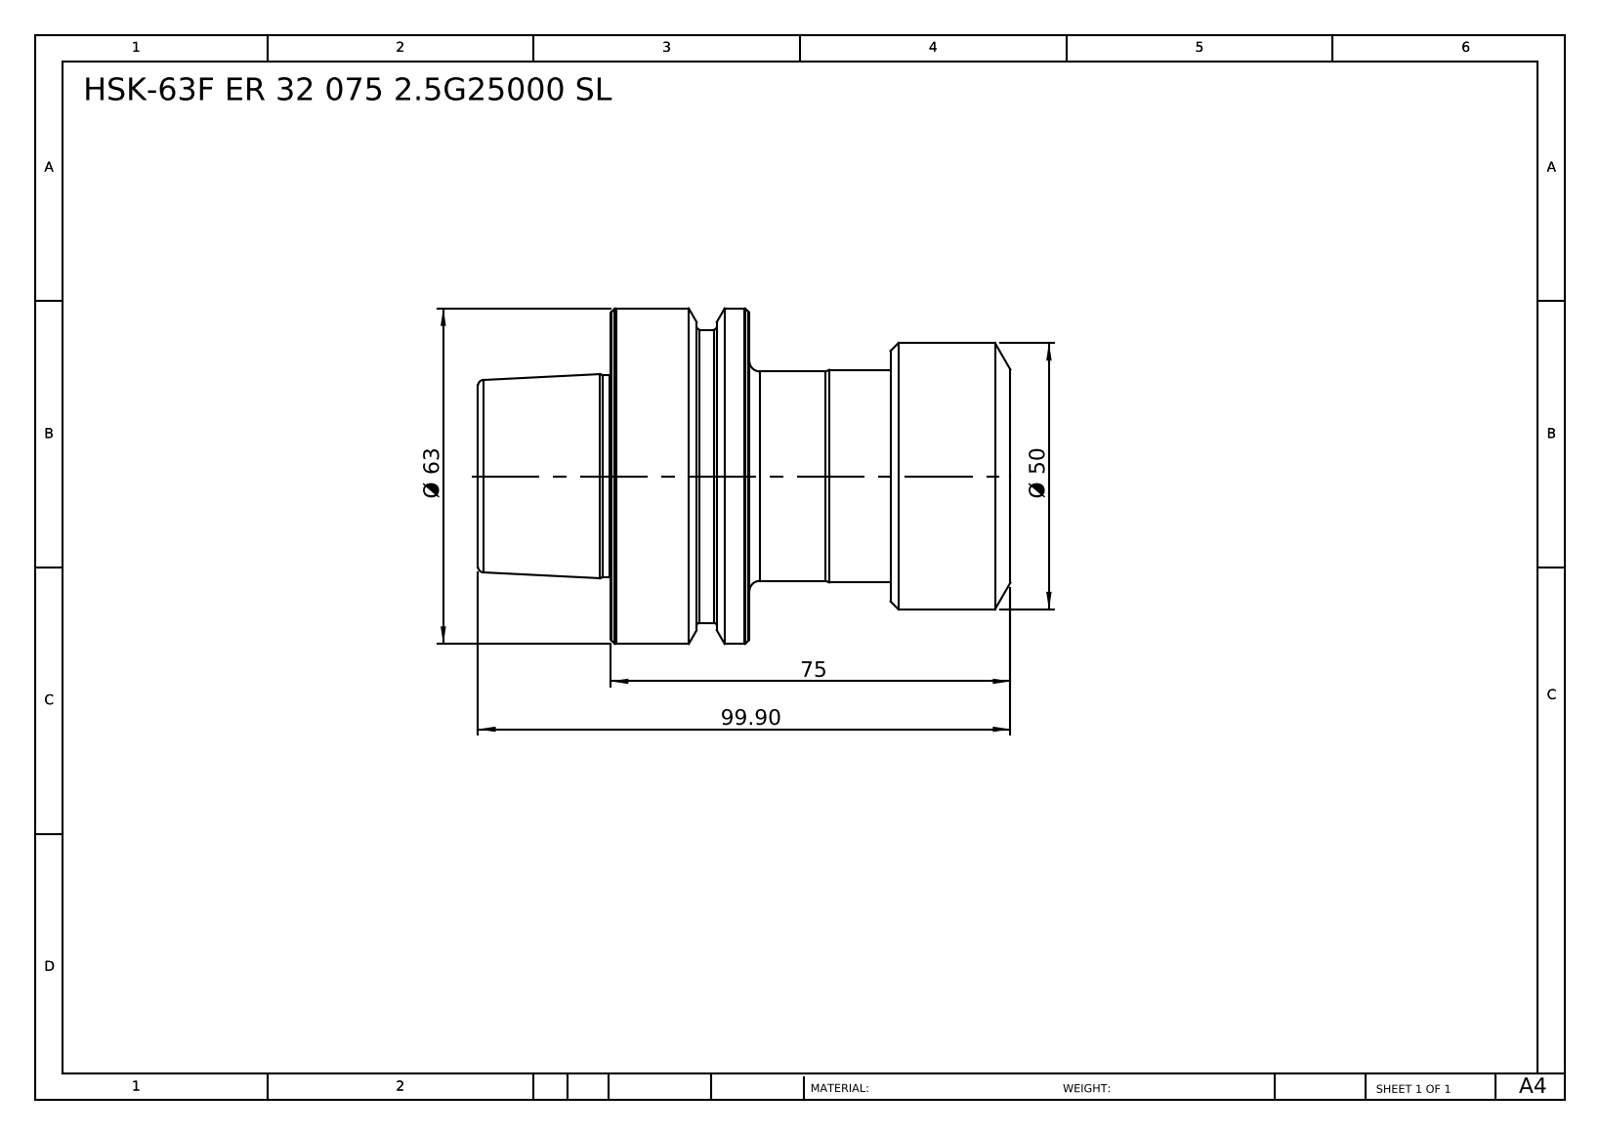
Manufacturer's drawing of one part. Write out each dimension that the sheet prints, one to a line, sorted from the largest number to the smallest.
99.90
75
Ø 63
Ø 50
